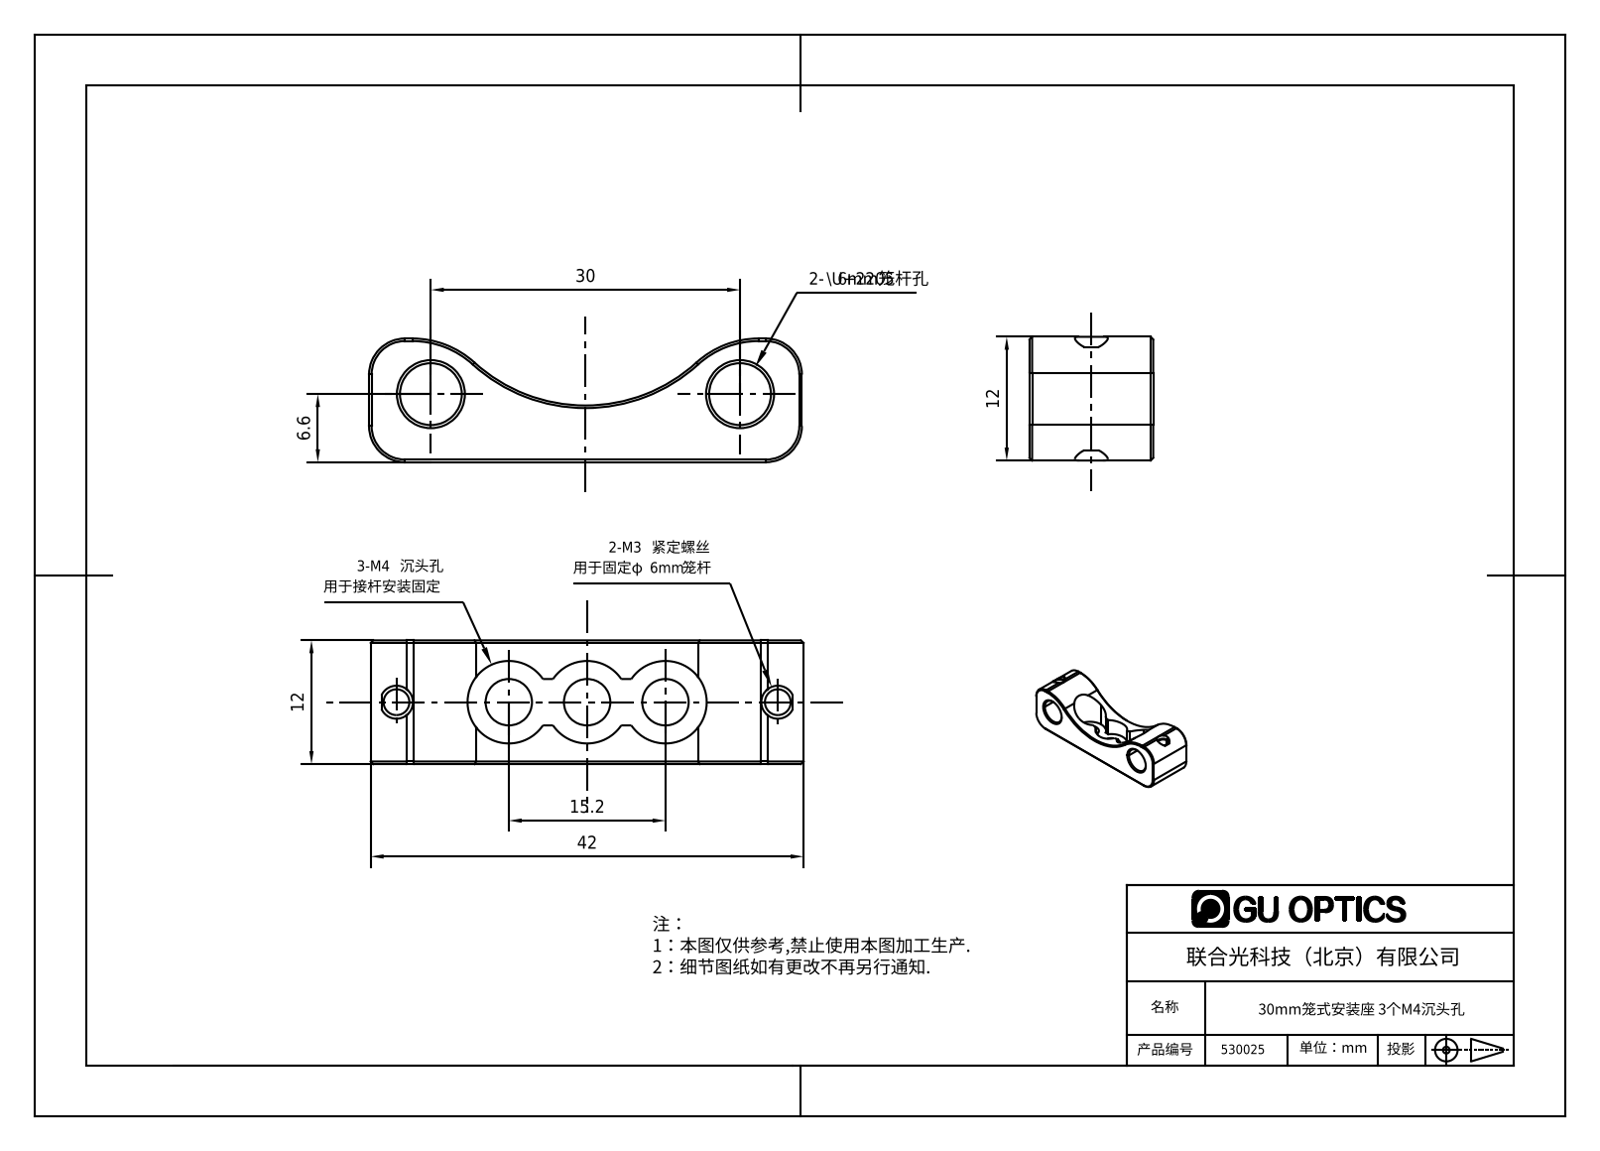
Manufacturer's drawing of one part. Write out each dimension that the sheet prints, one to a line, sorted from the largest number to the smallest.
42
30
15.2
12
12
6.6
